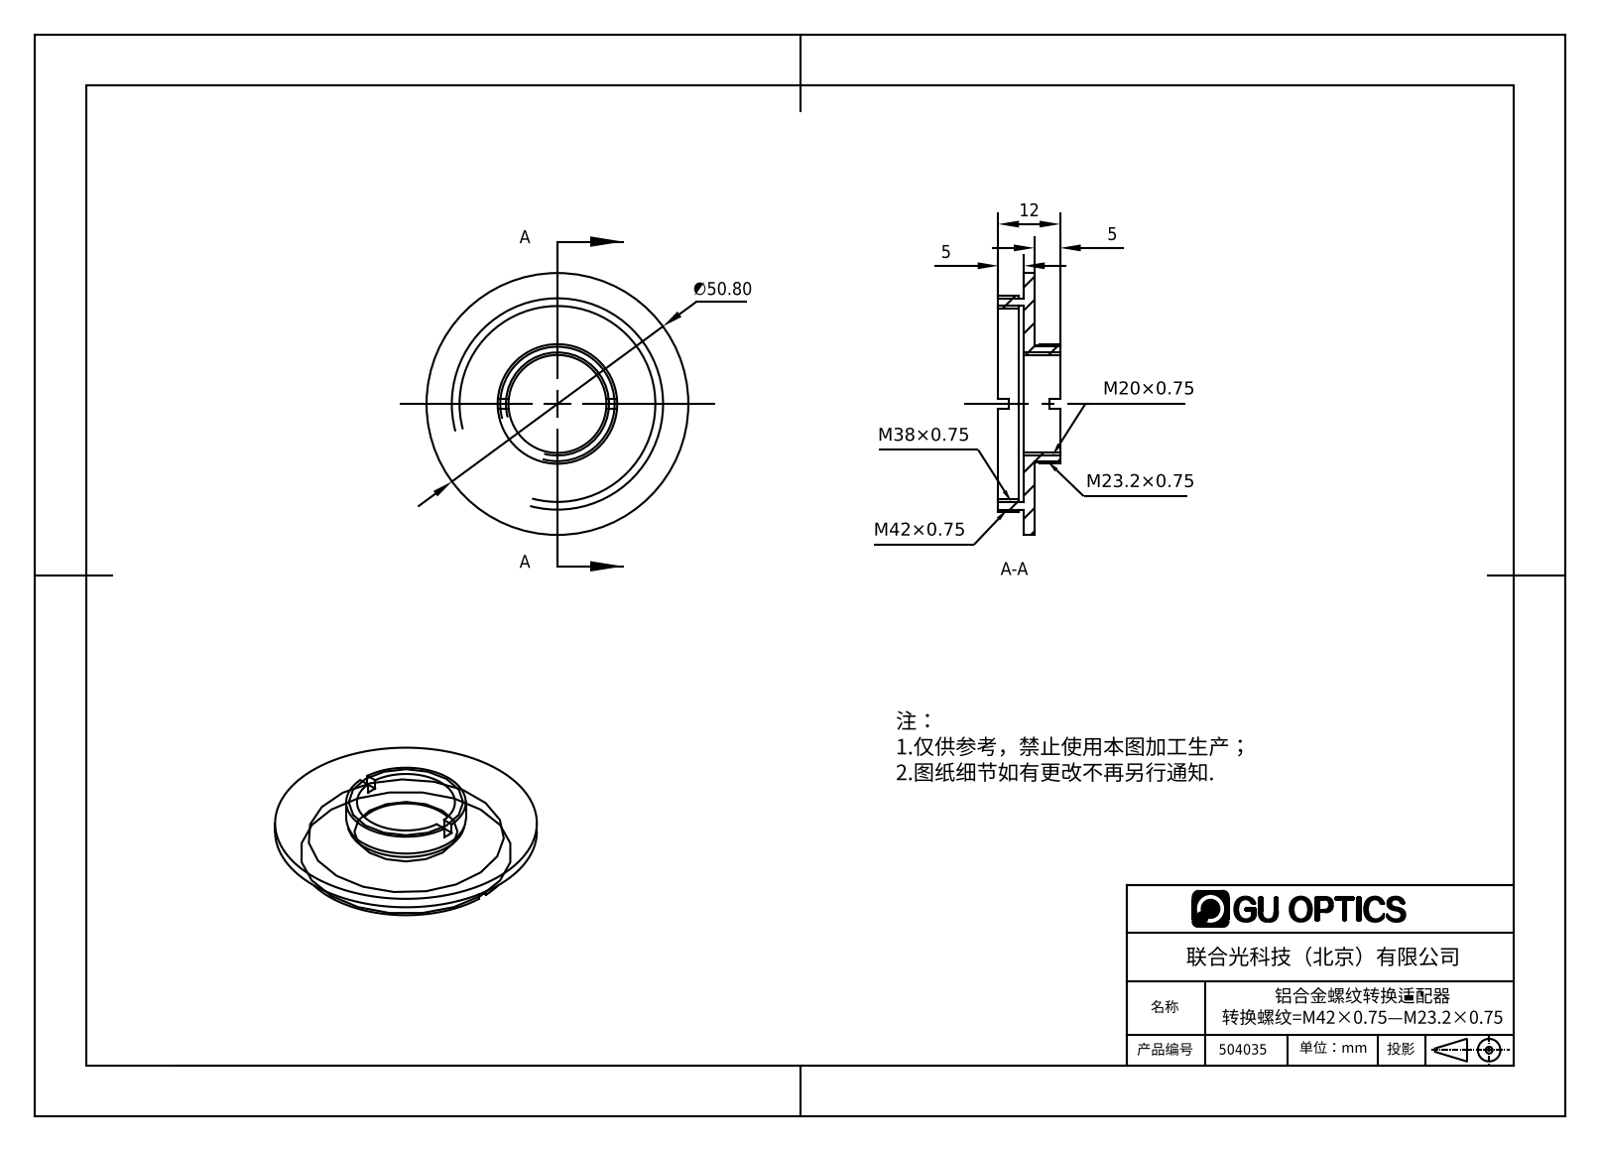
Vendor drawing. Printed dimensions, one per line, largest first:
∅50.80
12
5
5
